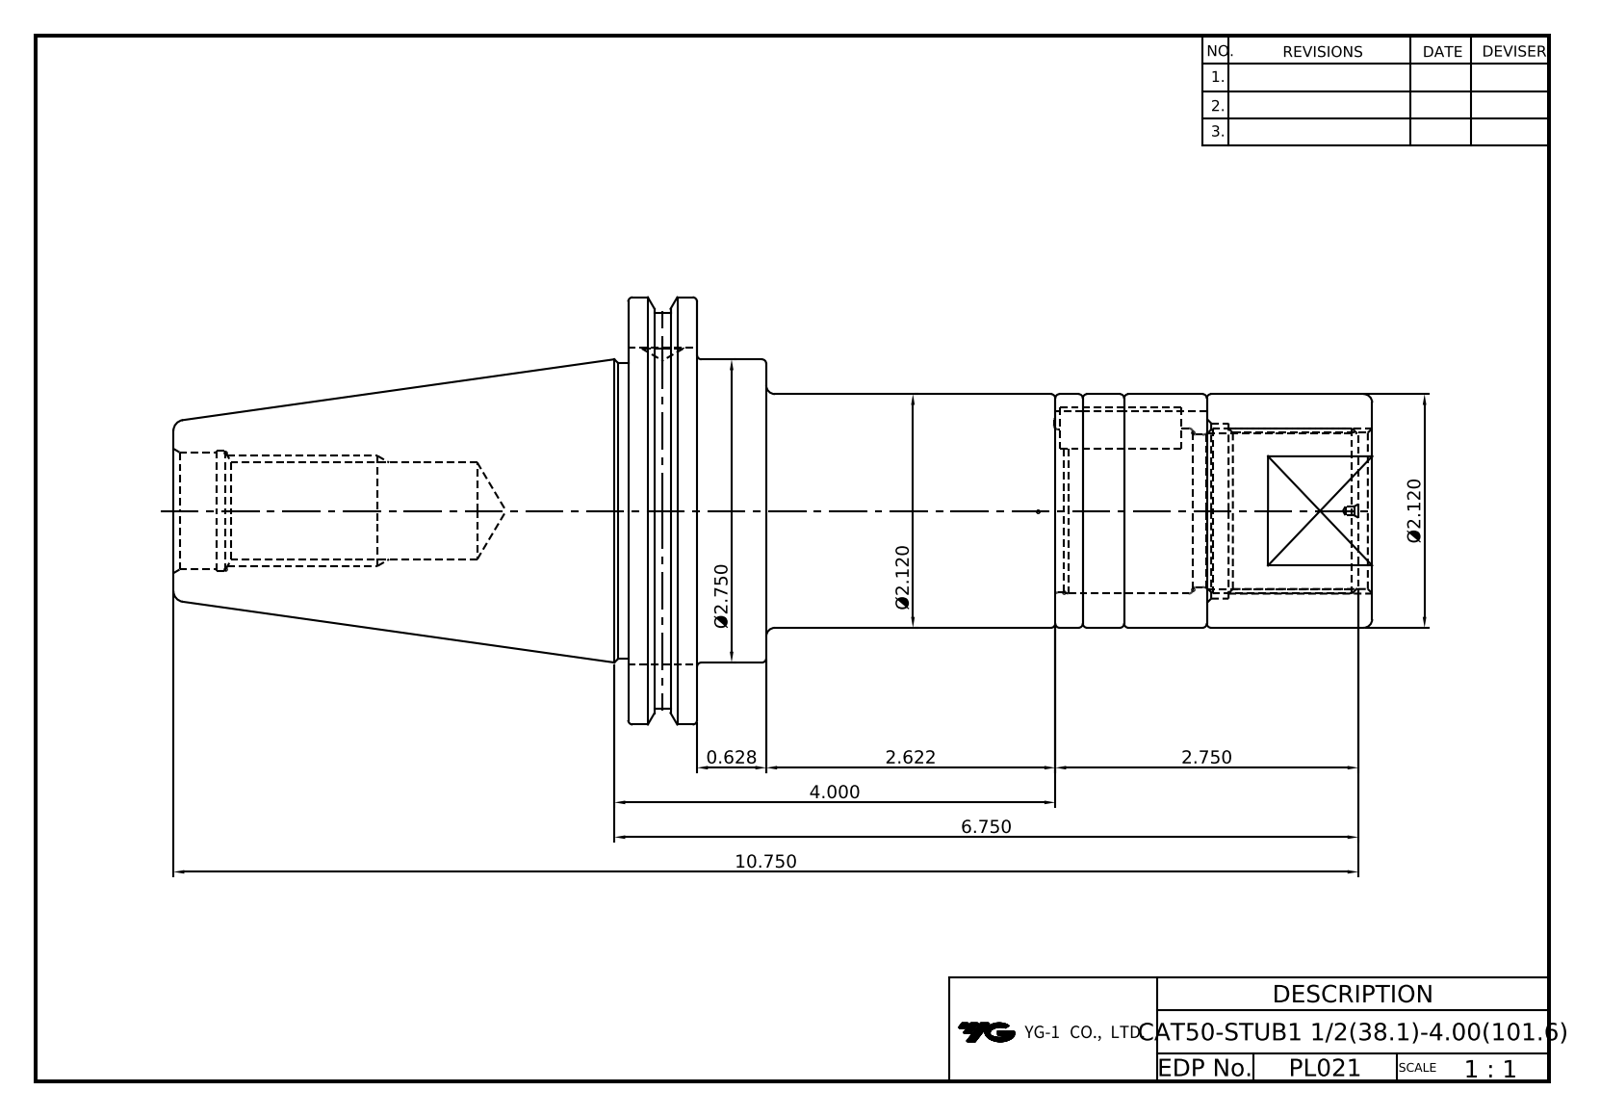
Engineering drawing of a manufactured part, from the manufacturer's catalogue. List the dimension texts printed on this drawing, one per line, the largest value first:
10.750
6.750
4.000
2.750
Ø2.750
2.622
Ø2.120
Ø2.120
0.628
